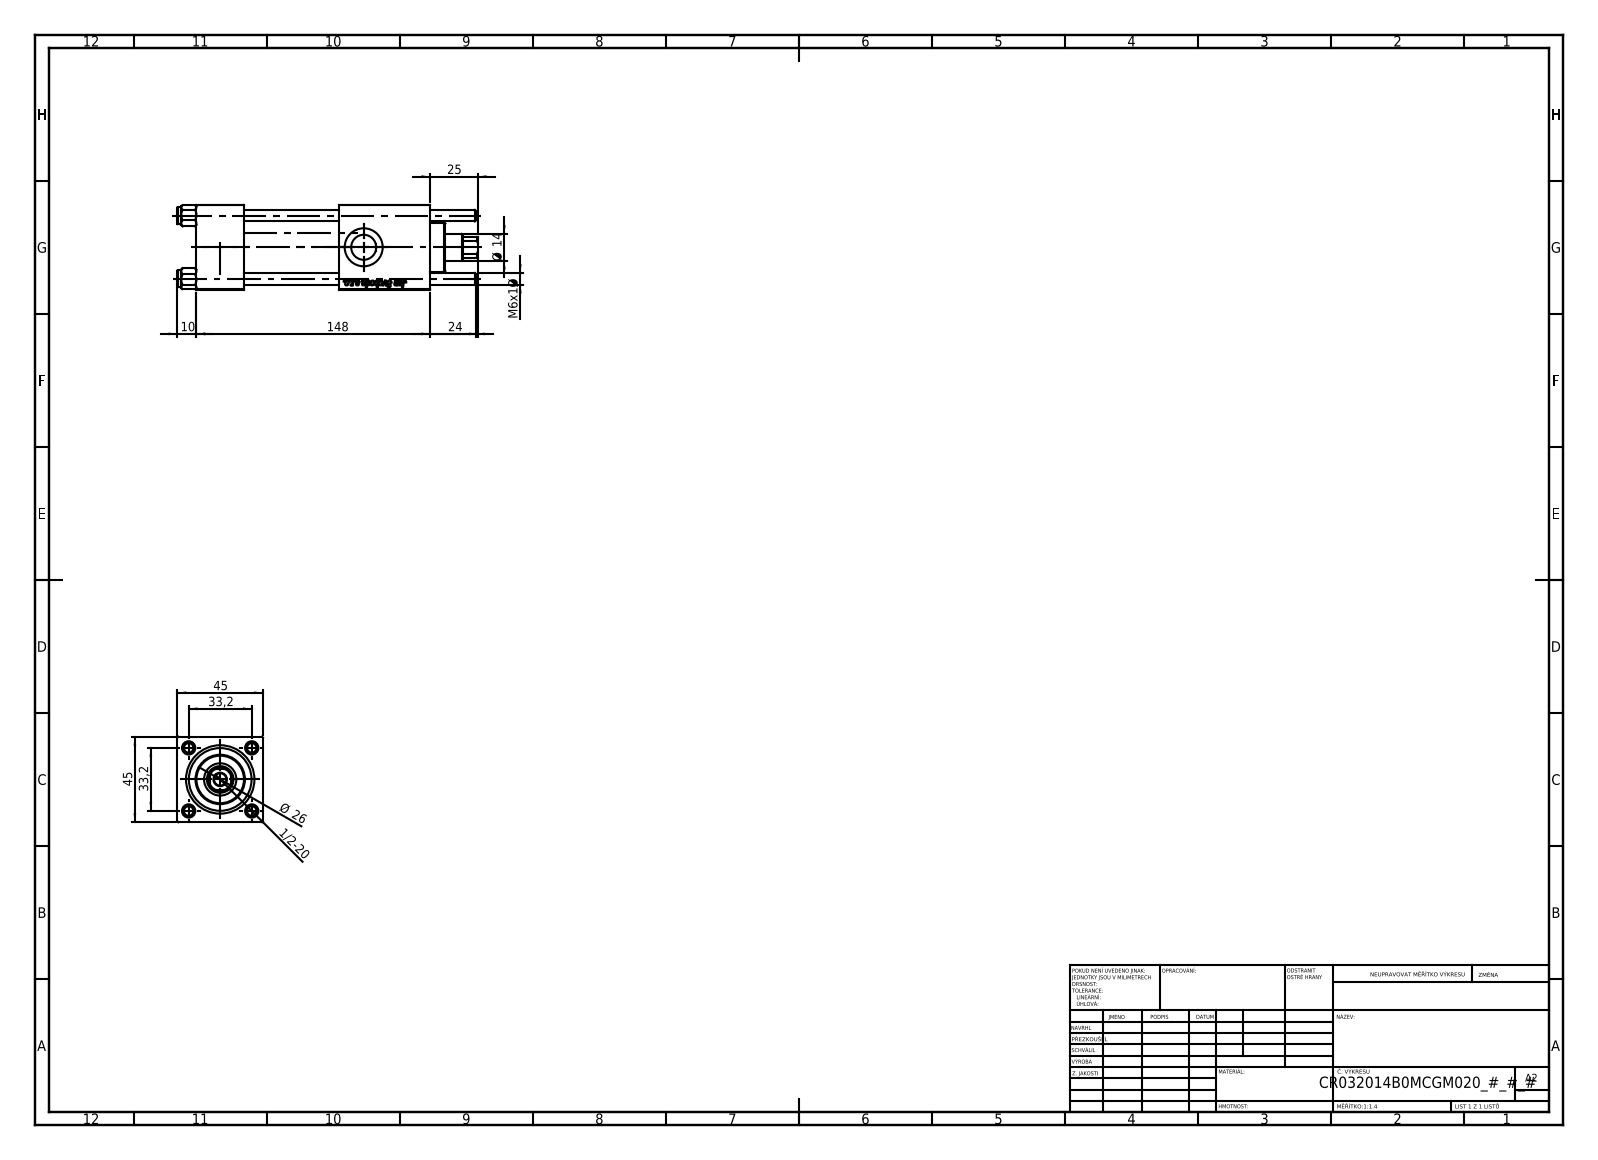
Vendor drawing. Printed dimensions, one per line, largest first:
148
45
45
33,2
33,2
Ø 26
25
24
Ø 14
10
M6x1 Ø
1/2-20
